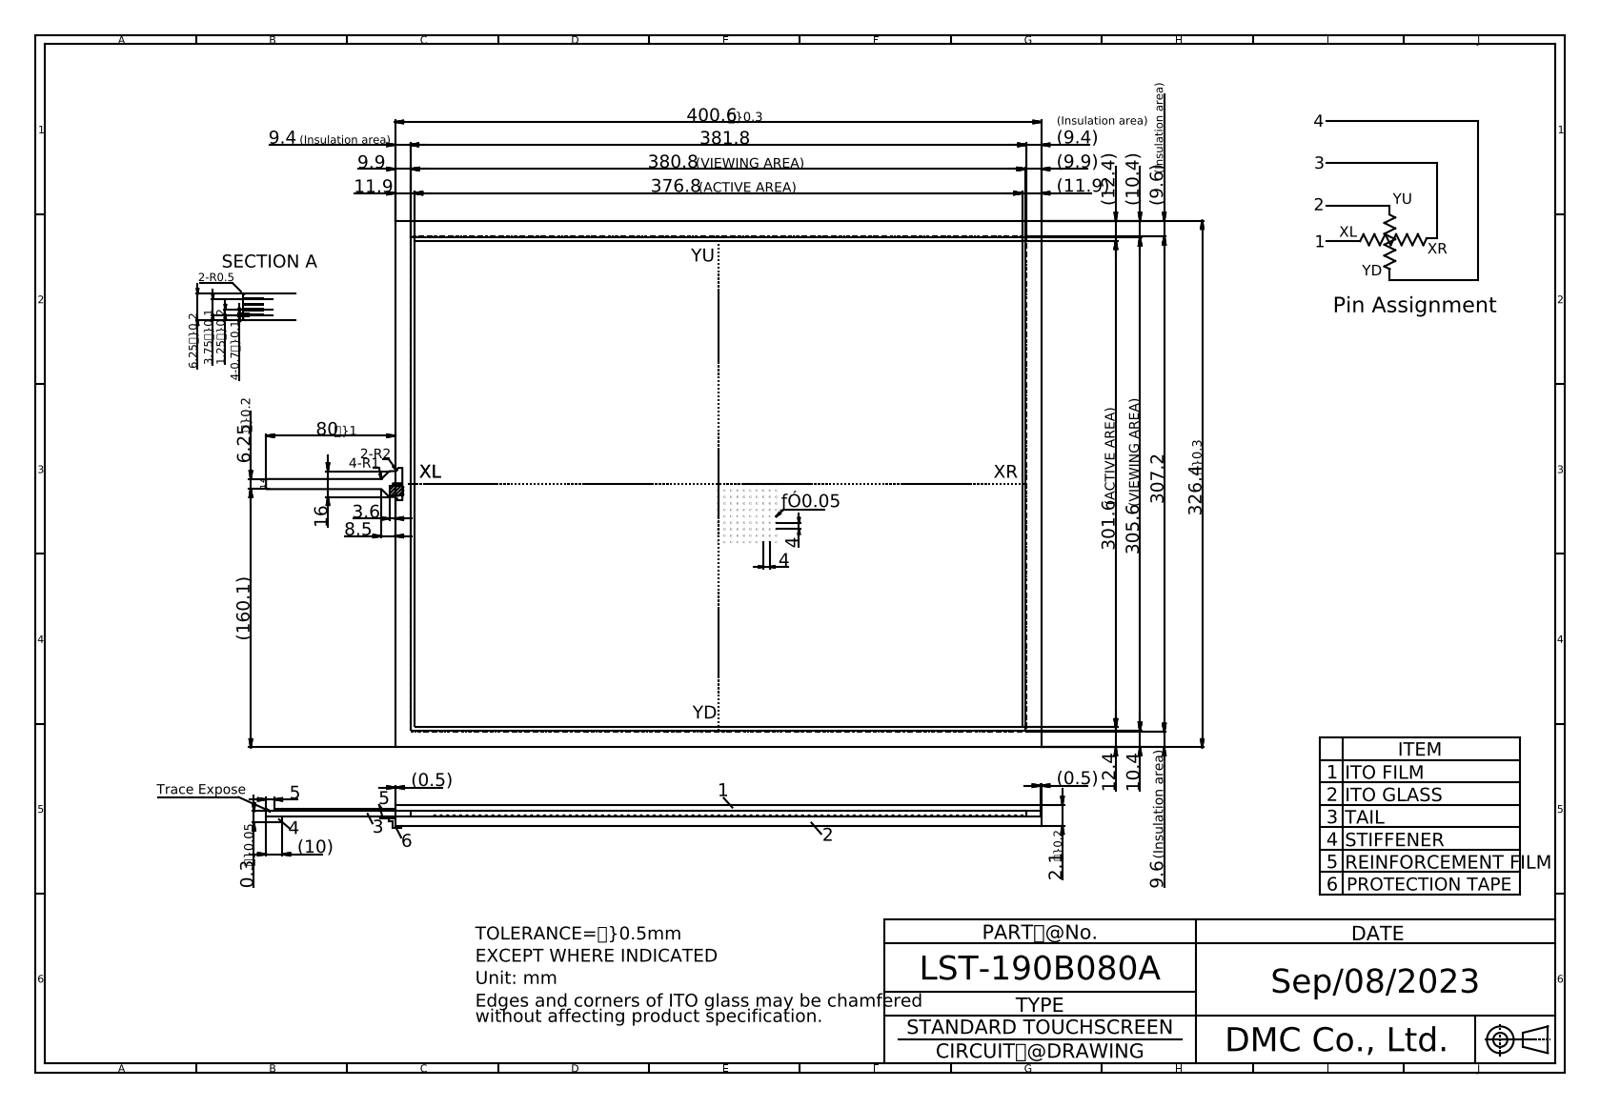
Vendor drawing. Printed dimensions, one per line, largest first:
400.6
381.8
380.8 {\H0.75x;(VIEWING AREA)}
376.8 {\H0.75x;(ACTIVE AREA)}
326.4
307.2
305.6 {\H0.75x;(VIEWING AREA)}
301.6 {\H0.75x;(ACTIVE AREA)}
(160.1)
80.0
16
12.4
(12.4)
11.9
(11.9)
10.4
(10.4)
(10)
9.9
(9.9)
9.6 {\H0.75x;(Insulation area)}
(9.6){\H0.625x;(Insulation area)}
9.4 {\H0.625x;(Insulation area)}
(9.4)
8.5
6.25?}0.2
6.25
5
4-0.7?}0.1
4
4
3.75?}0.1
3.6
2.1{\H0.625x;?}0.2}
1.25?}0.2
(0.5)
(0.5)
0.3{\H0.7x;?}0.05}
